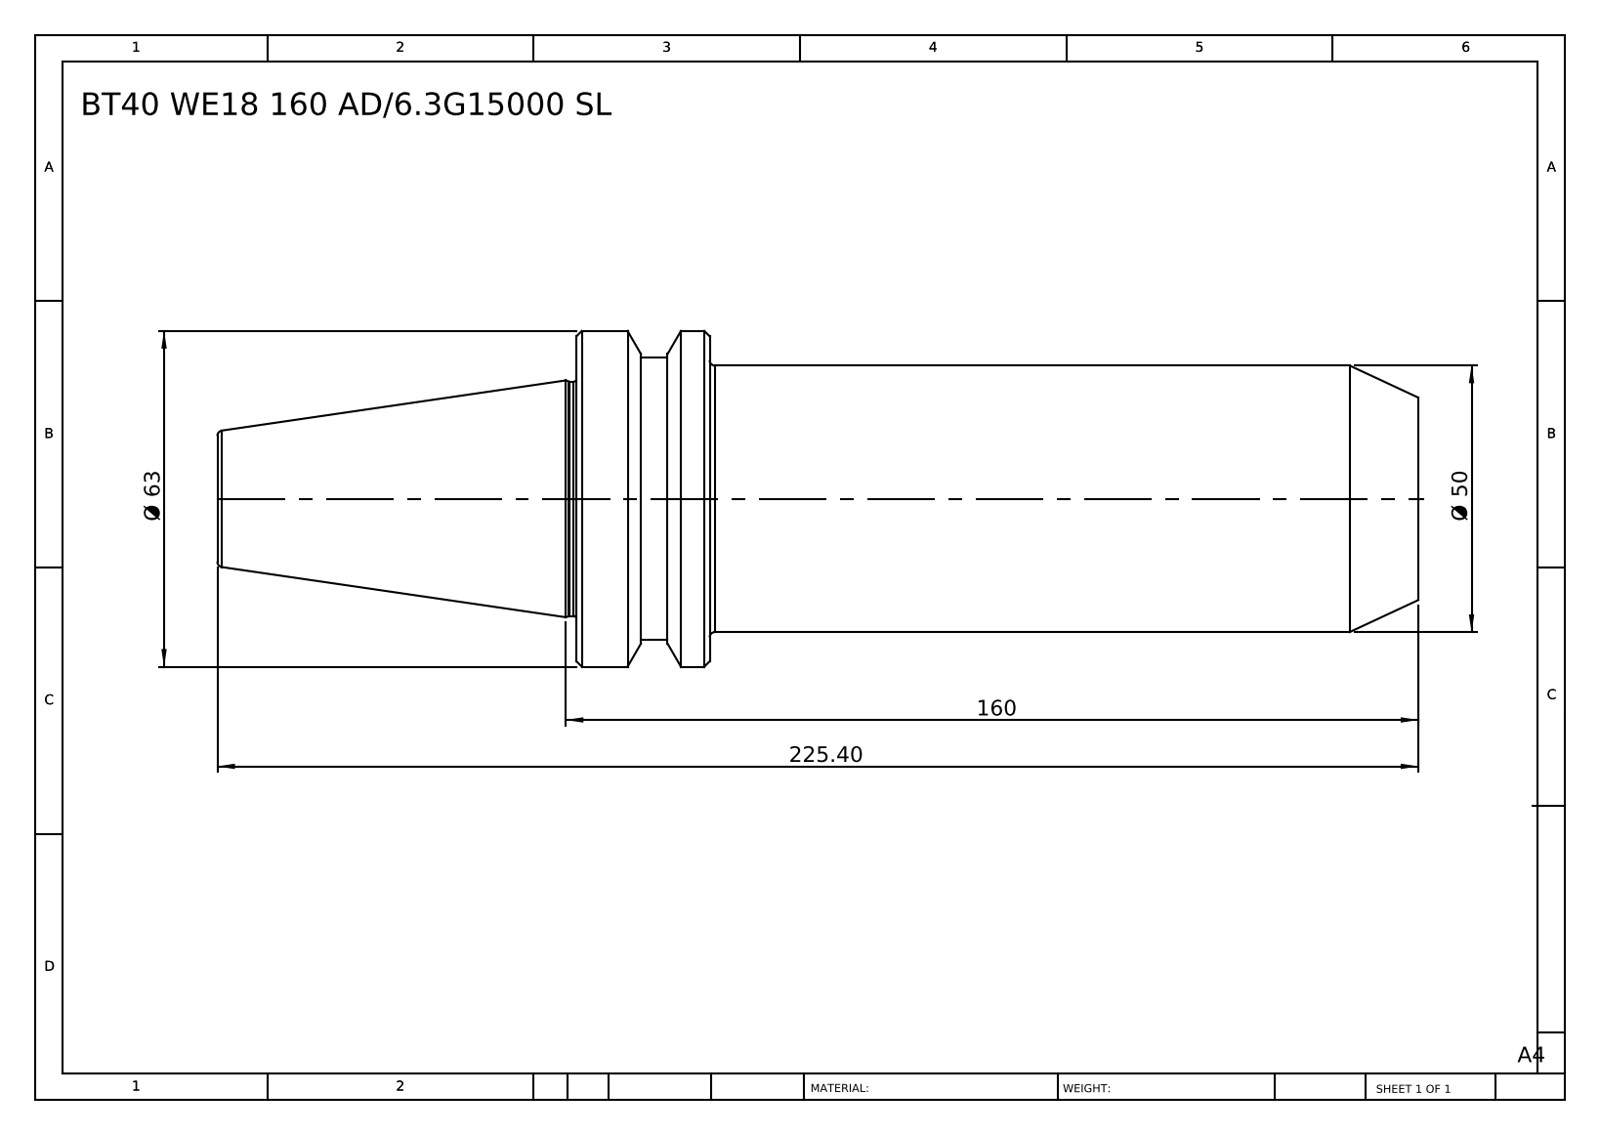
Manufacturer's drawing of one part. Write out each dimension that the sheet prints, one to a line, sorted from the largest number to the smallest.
225.40
160
Ø 63
Ø 50
